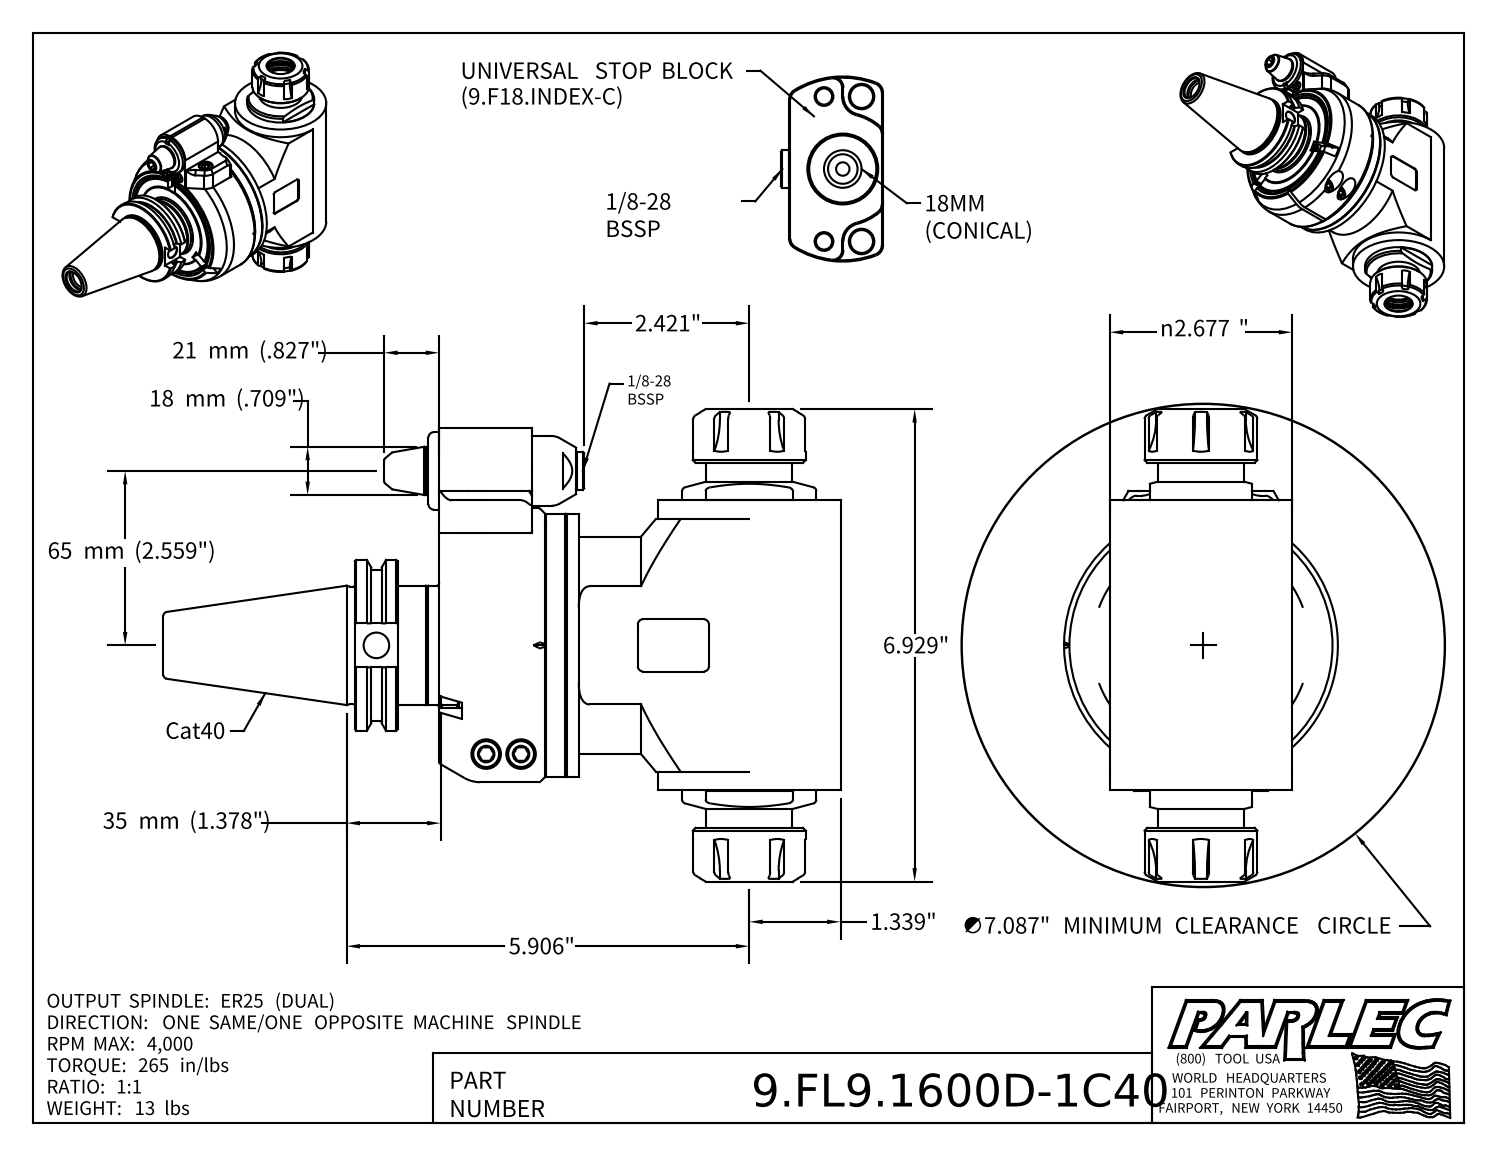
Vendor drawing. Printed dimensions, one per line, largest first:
65 mm (2.559")
35 mm (1.378")
21 mm (.827")
18 mm (.709")
∅7.087" MINIMUM CLEARANCE CIRCLE
6.929"
5.906"
n2.677"
2.421"
1.339"
